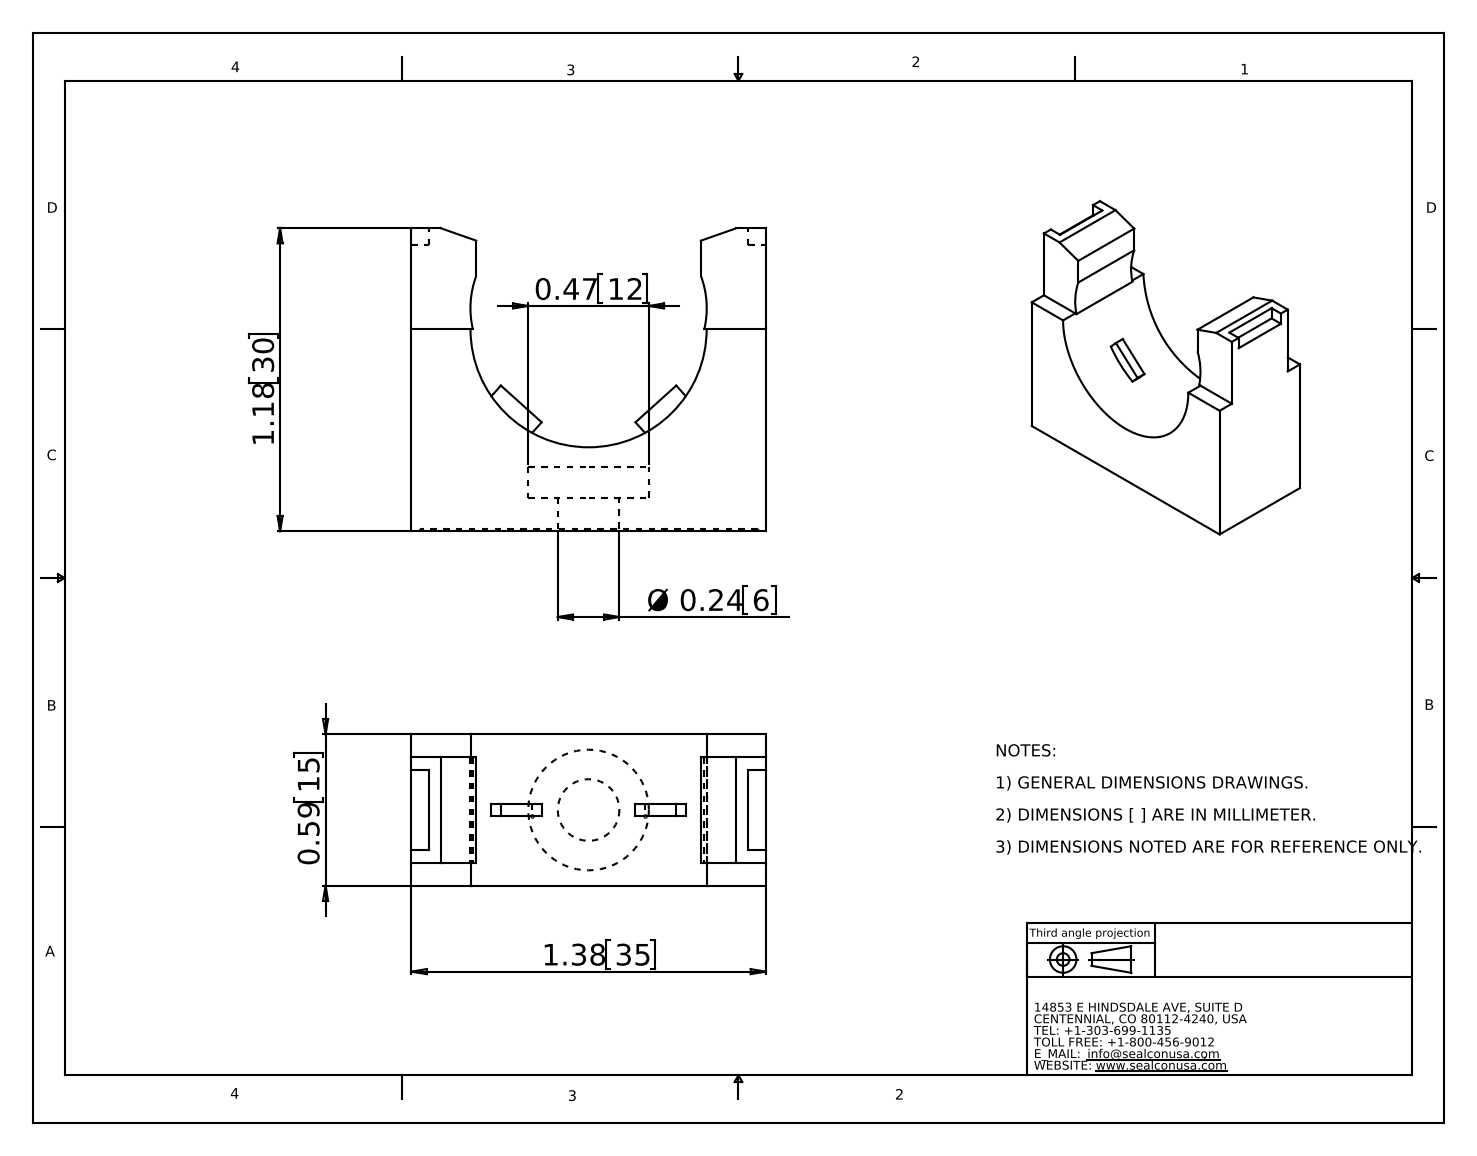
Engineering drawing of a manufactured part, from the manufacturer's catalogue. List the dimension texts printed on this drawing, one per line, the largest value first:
1.38 35
1.18 30
0.59 15
0.47 12
Ø 0.24 6
